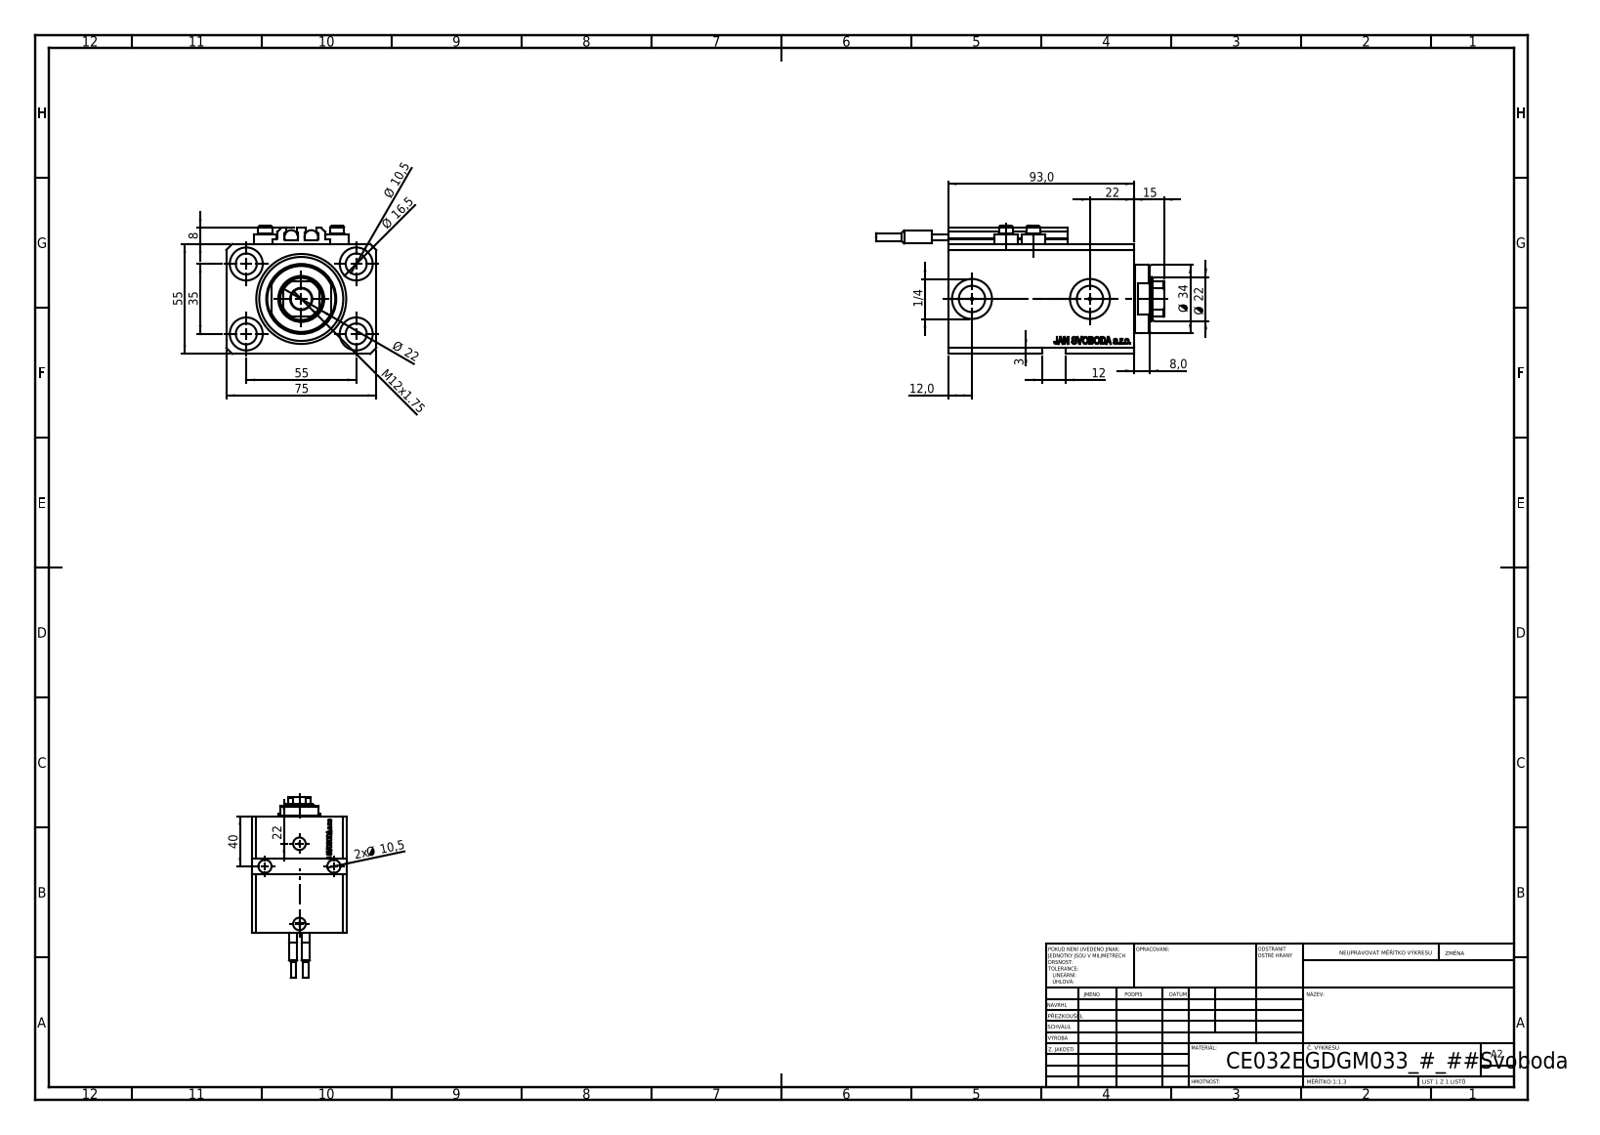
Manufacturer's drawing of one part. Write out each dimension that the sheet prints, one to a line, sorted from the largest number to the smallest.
93,0
75
55
55
40
35
Ø 34
Ø 22
22
Ø 22
22
Ø 16,5
15
M12x1.75
12,0
12
Ø 10,5
2x Ø 10,5
8
8,0
3
1/4
